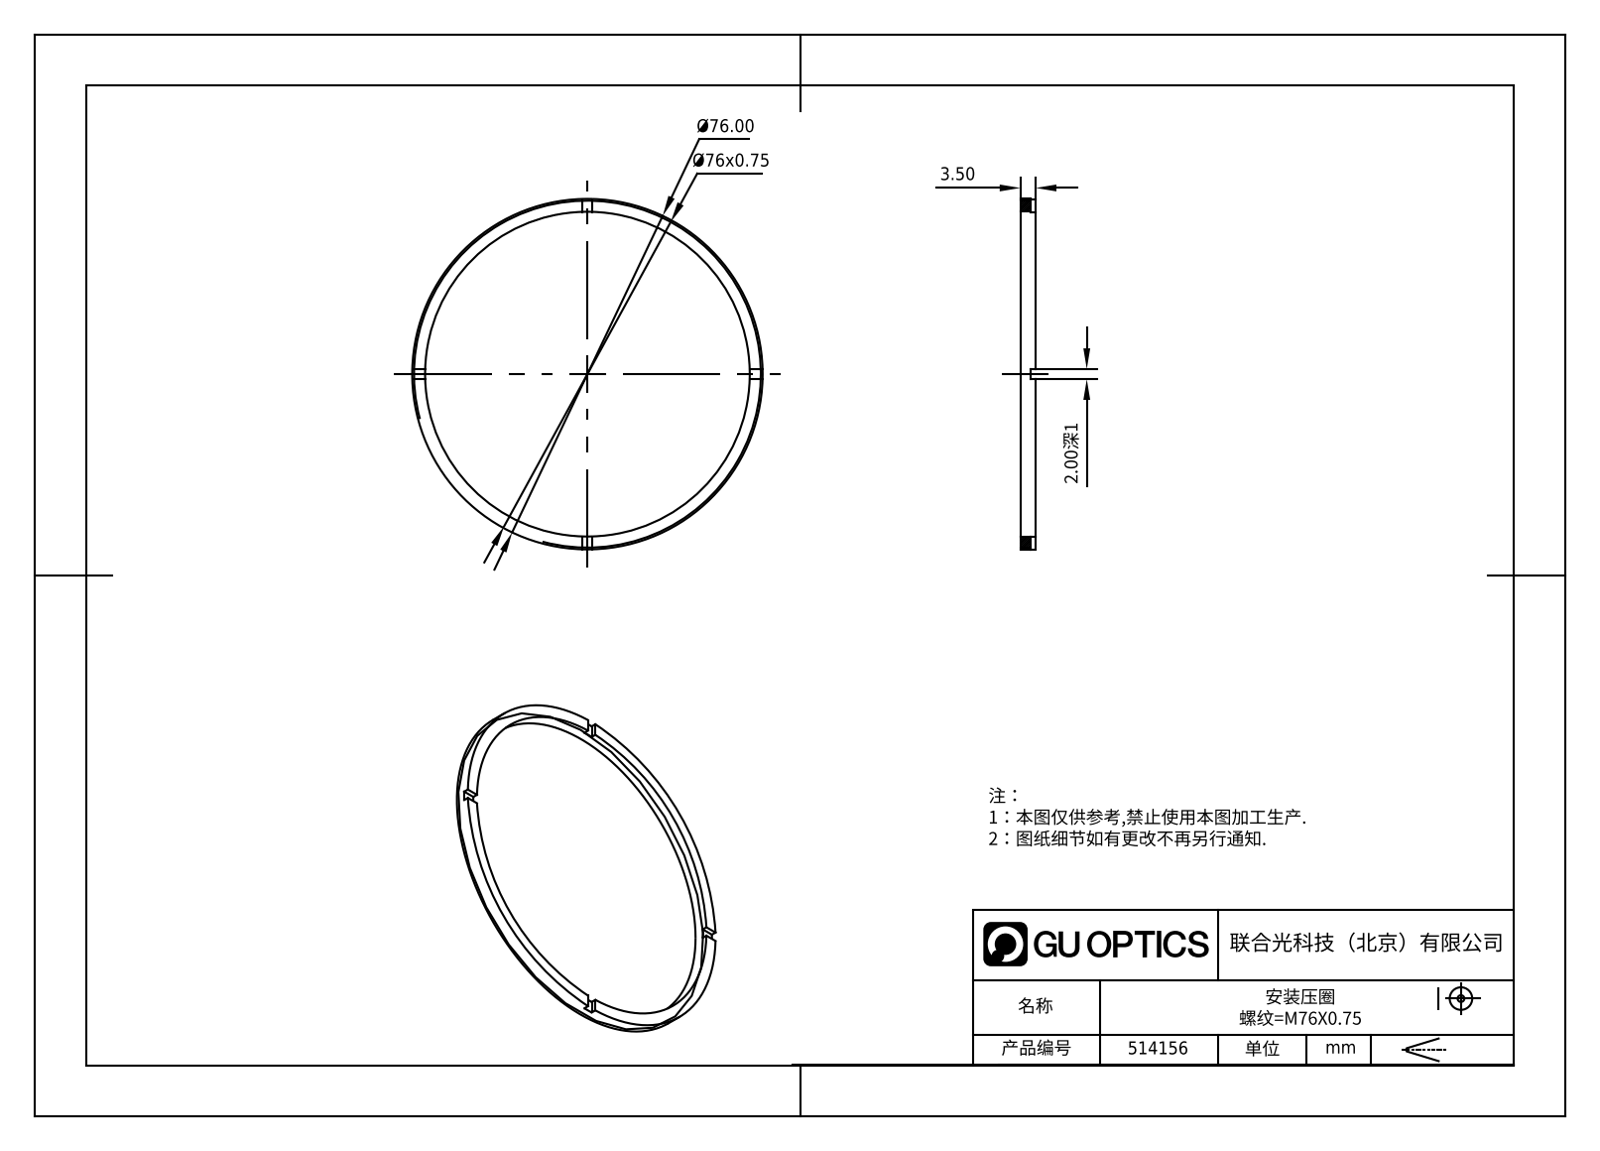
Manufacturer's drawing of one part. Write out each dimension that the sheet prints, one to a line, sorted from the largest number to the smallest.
Ø76.00
Ø76x0.75
3.50
2.00深1
